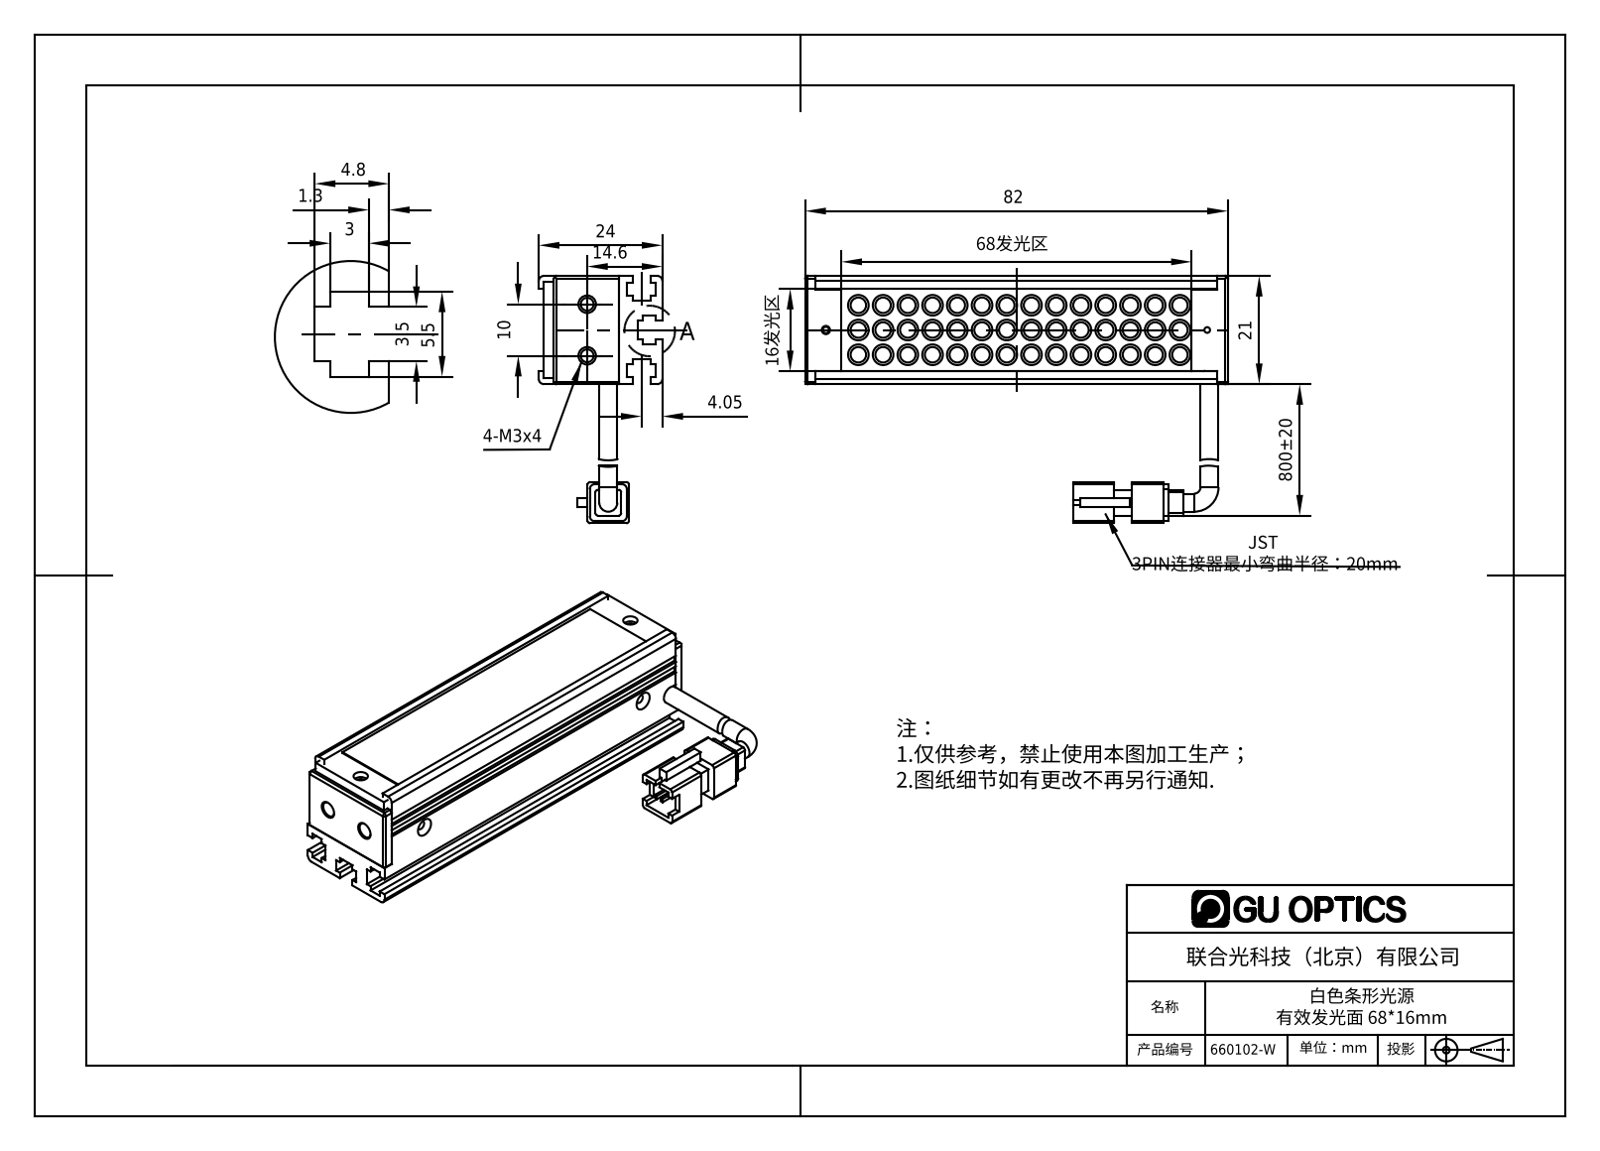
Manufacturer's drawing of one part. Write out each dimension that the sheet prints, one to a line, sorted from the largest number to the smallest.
800±20
82
68发光区
24
21
16发光区
14.6
10
5.5
4.8
4.05
3.5
3
1.3
